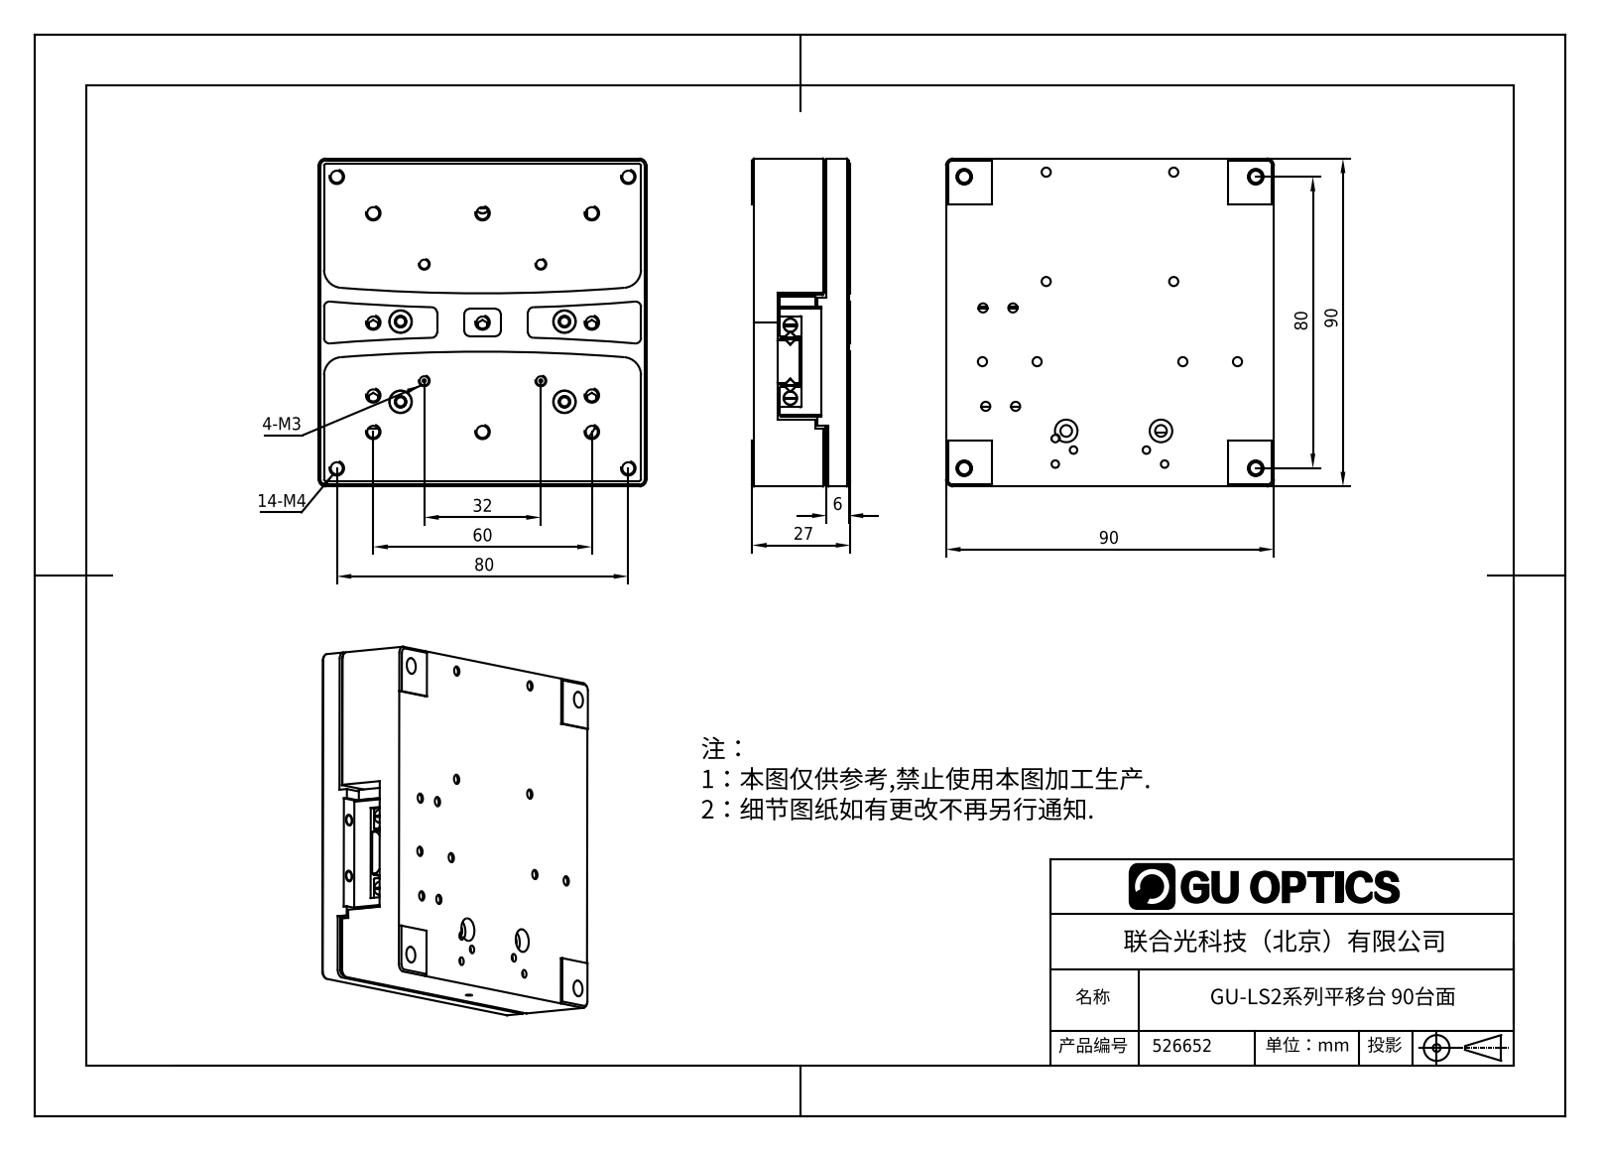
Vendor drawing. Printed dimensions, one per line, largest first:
90
90
80
80
60
32
27
6
